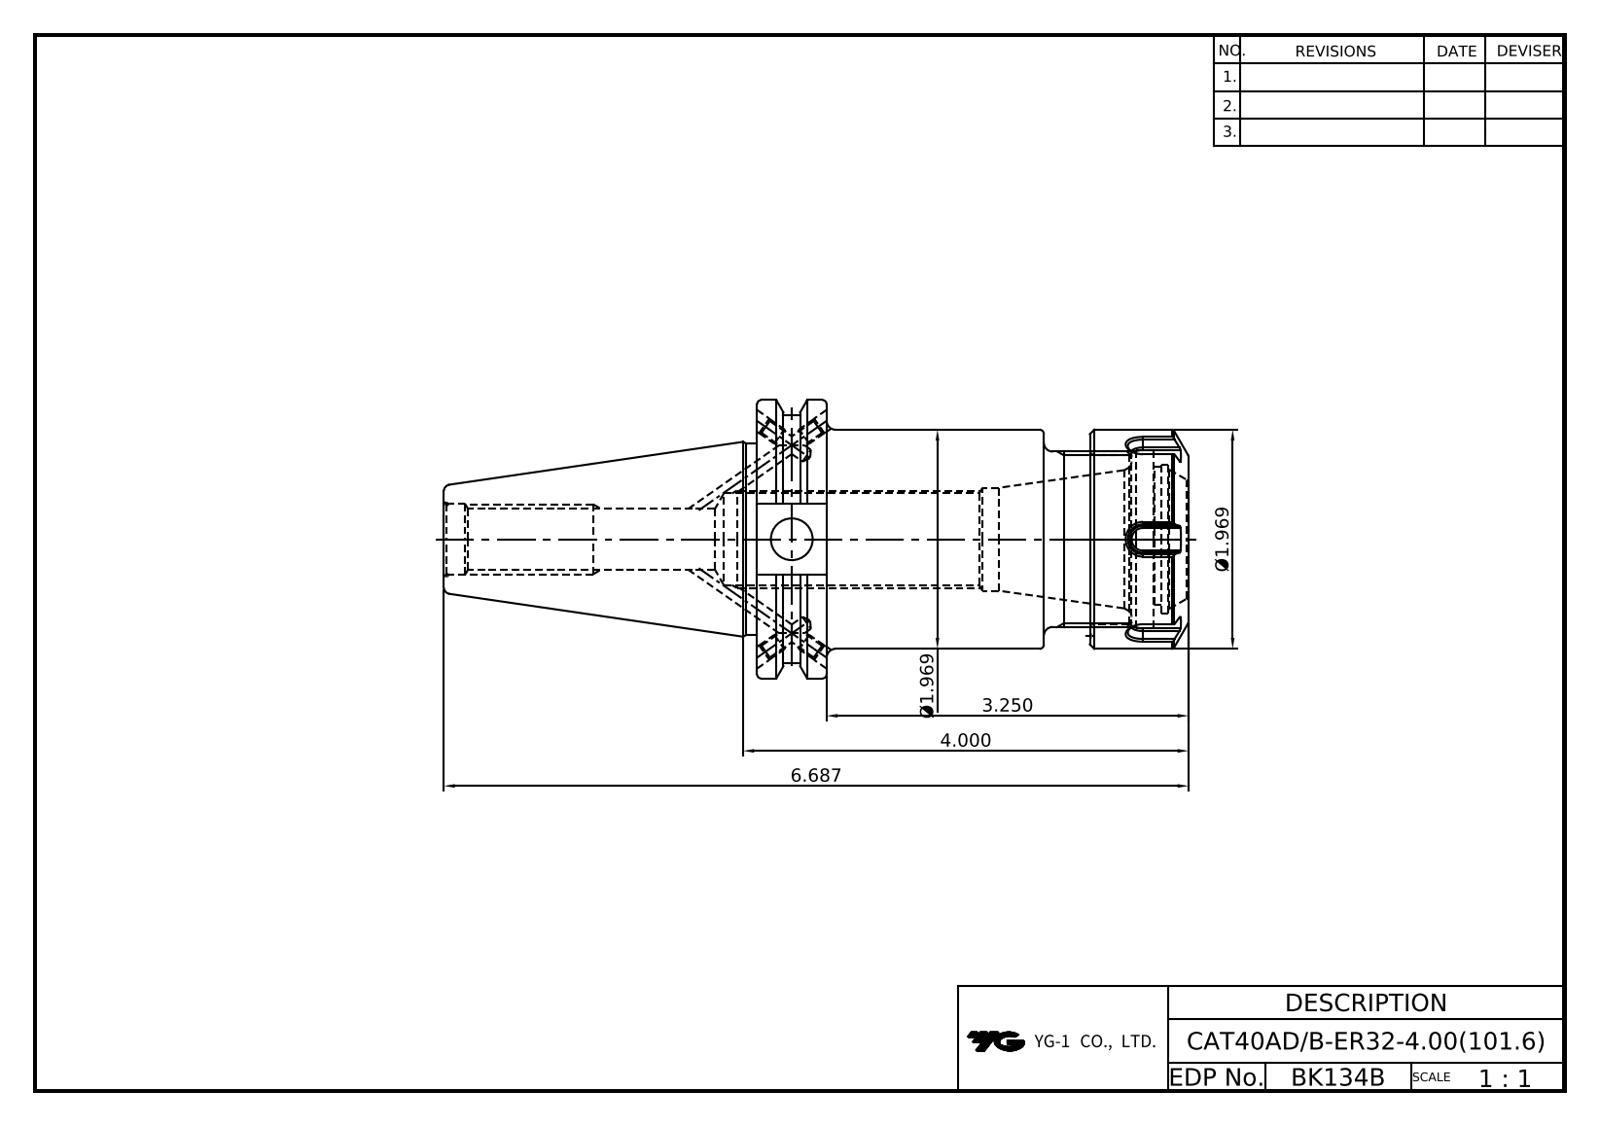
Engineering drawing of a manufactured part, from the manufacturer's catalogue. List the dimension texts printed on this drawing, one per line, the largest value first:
6.687
4.000
3.250
Ø1.969
Ø1.969
